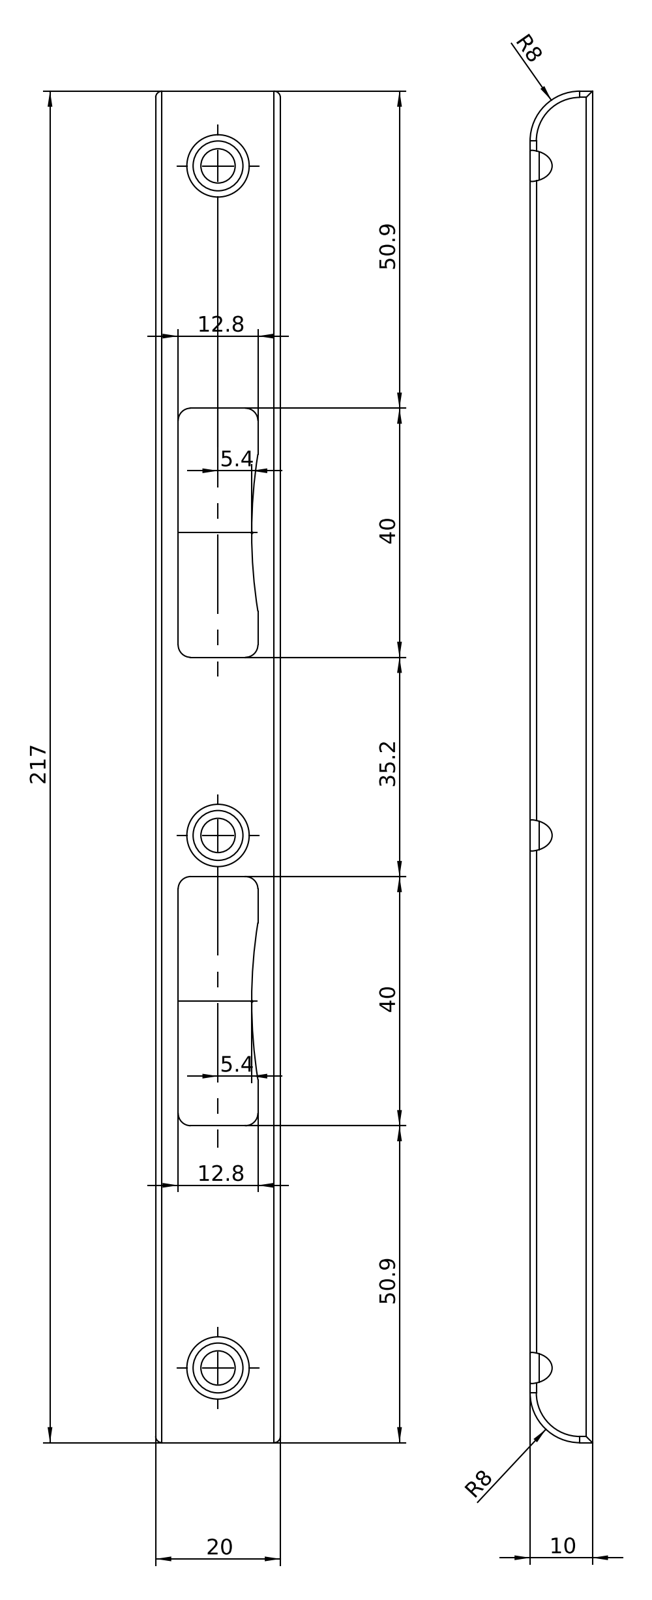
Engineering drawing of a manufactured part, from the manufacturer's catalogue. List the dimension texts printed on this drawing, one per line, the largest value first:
217
50.9
50.9
40
40
35.2
20
12.8
12.8
10
R8
R8
5.4
5.4
